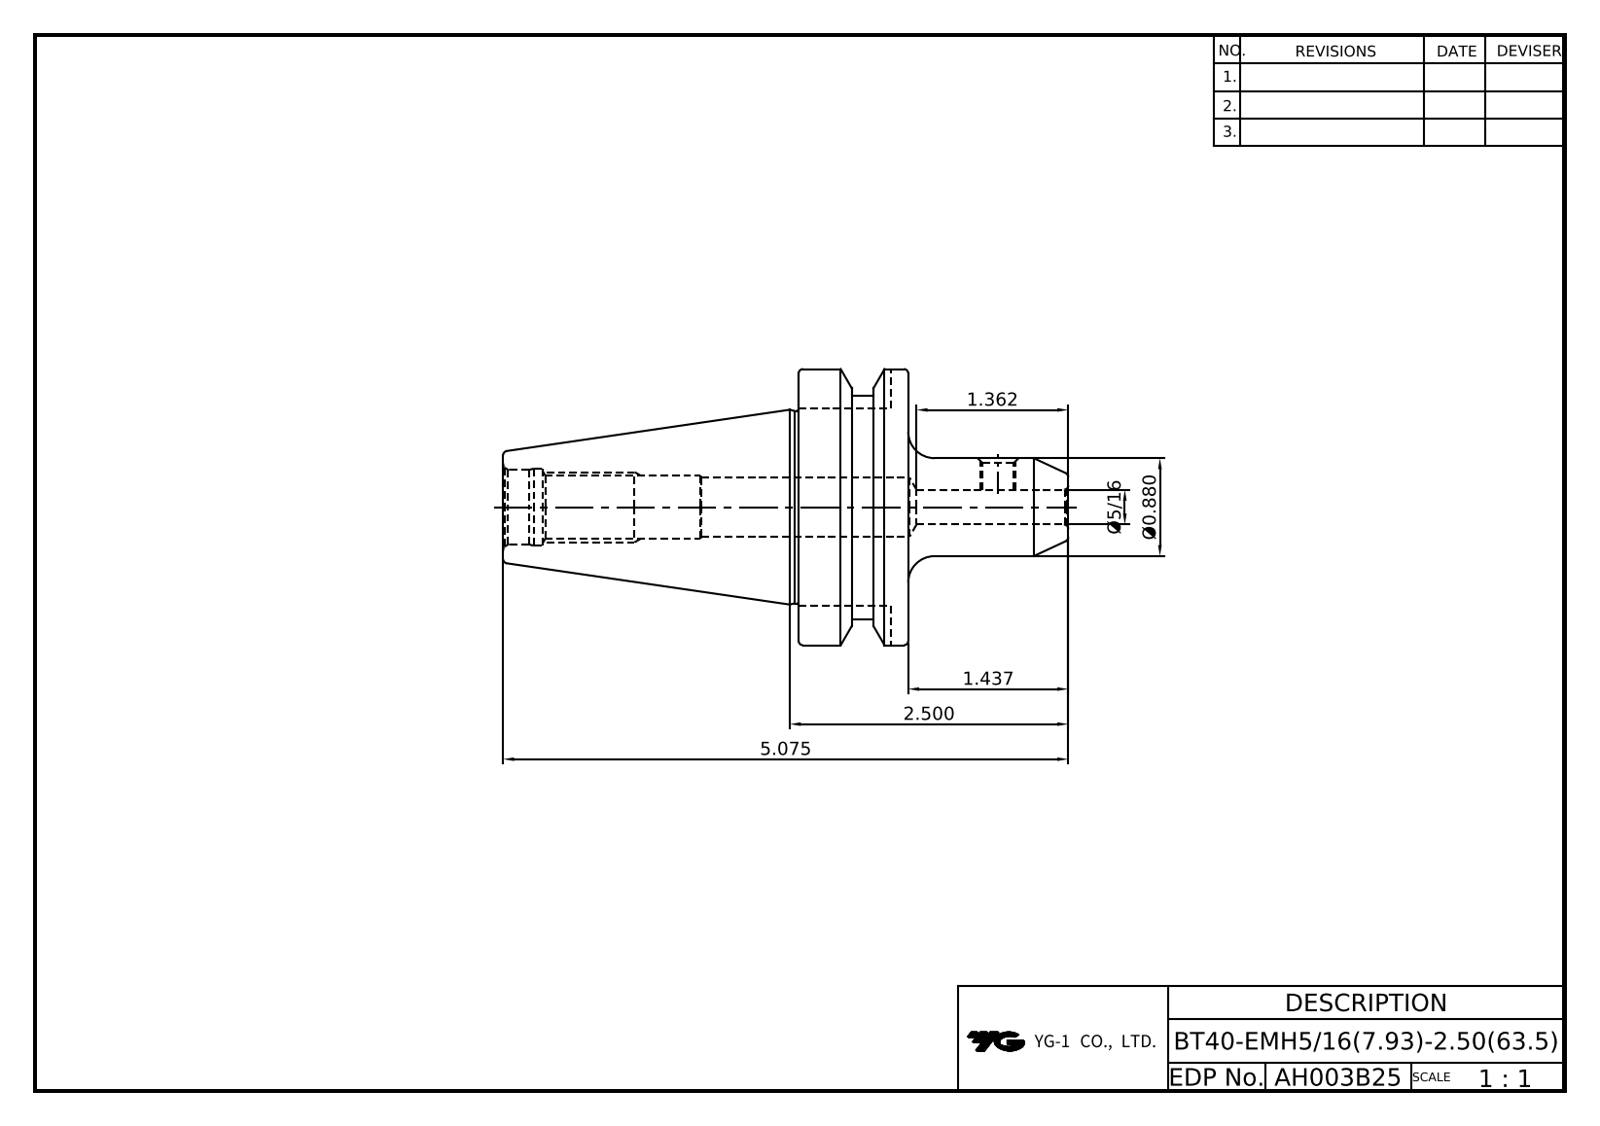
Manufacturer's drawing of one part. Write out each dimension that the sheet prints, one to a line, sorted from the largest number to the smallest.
5.075
2.500
1.437
1.362
Ø0.880
Ø5/16
